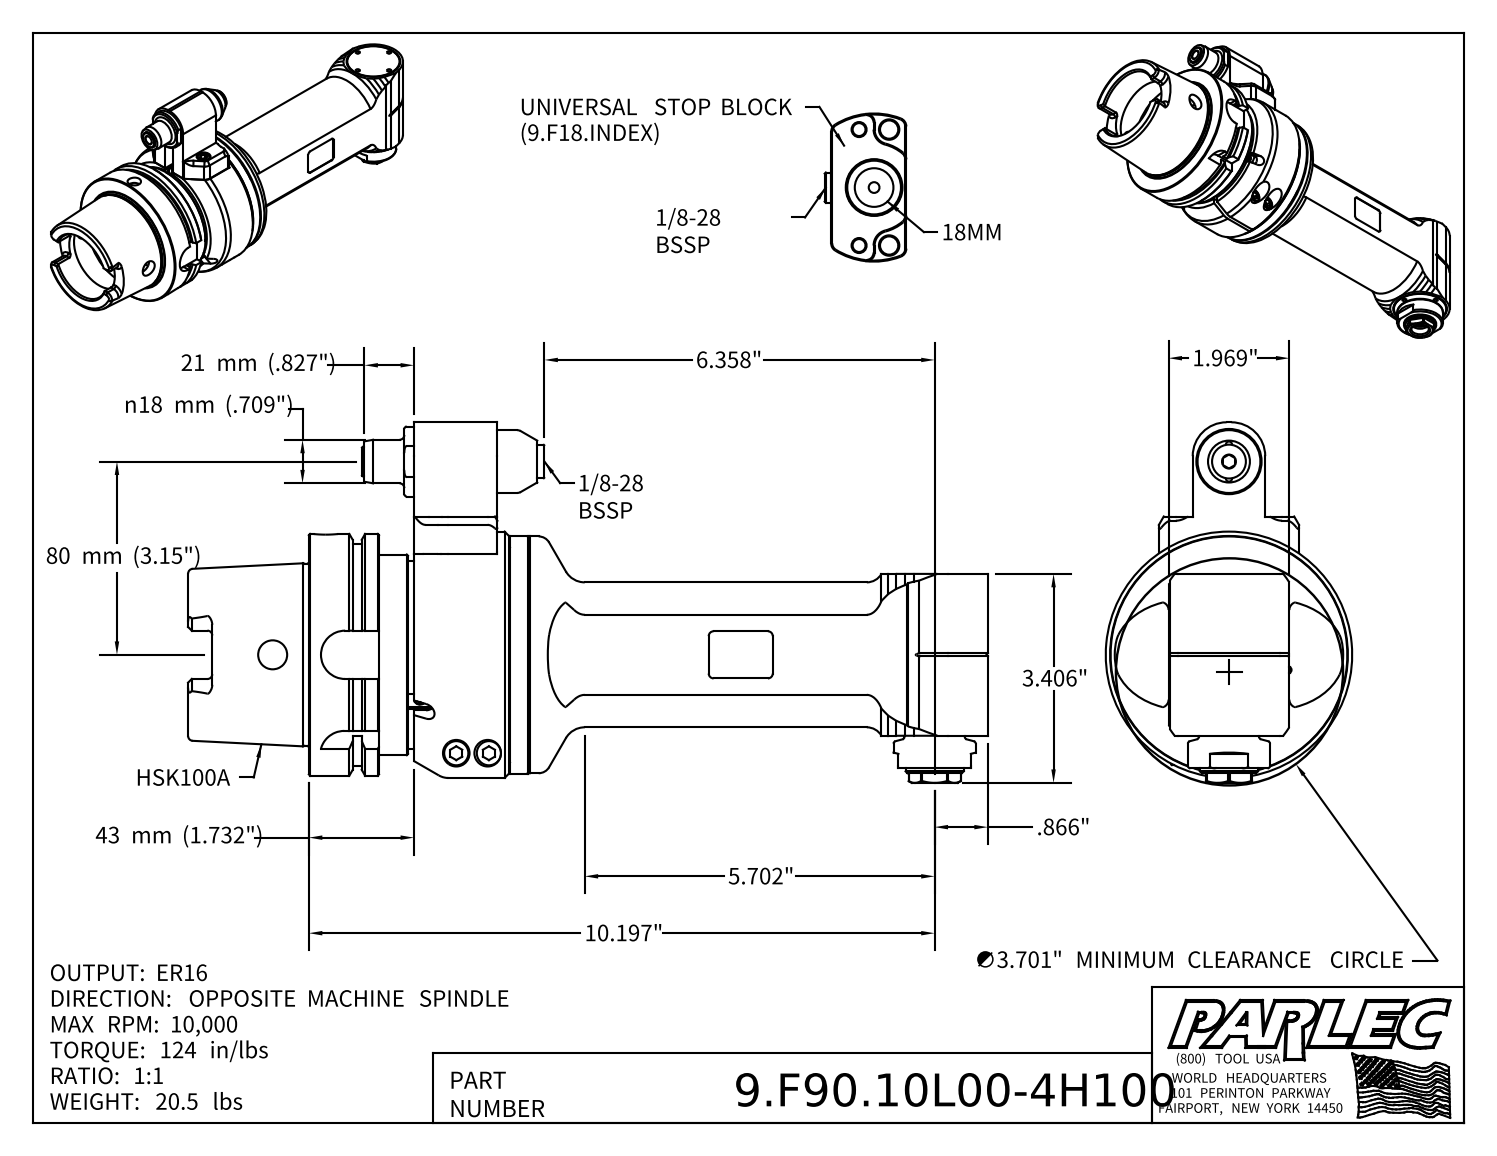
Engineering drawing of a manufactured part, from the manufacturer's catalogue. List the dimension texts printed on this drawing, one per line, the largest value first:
80 mm (3.15")
43 mm (1.732")
21 mm (.827")
n18 mm (.709")
10.197"
6.358"
5.702"
∅3.701" MINIMUM CLEARANCE CIRCLE
3.406"
1.969"
.866"
